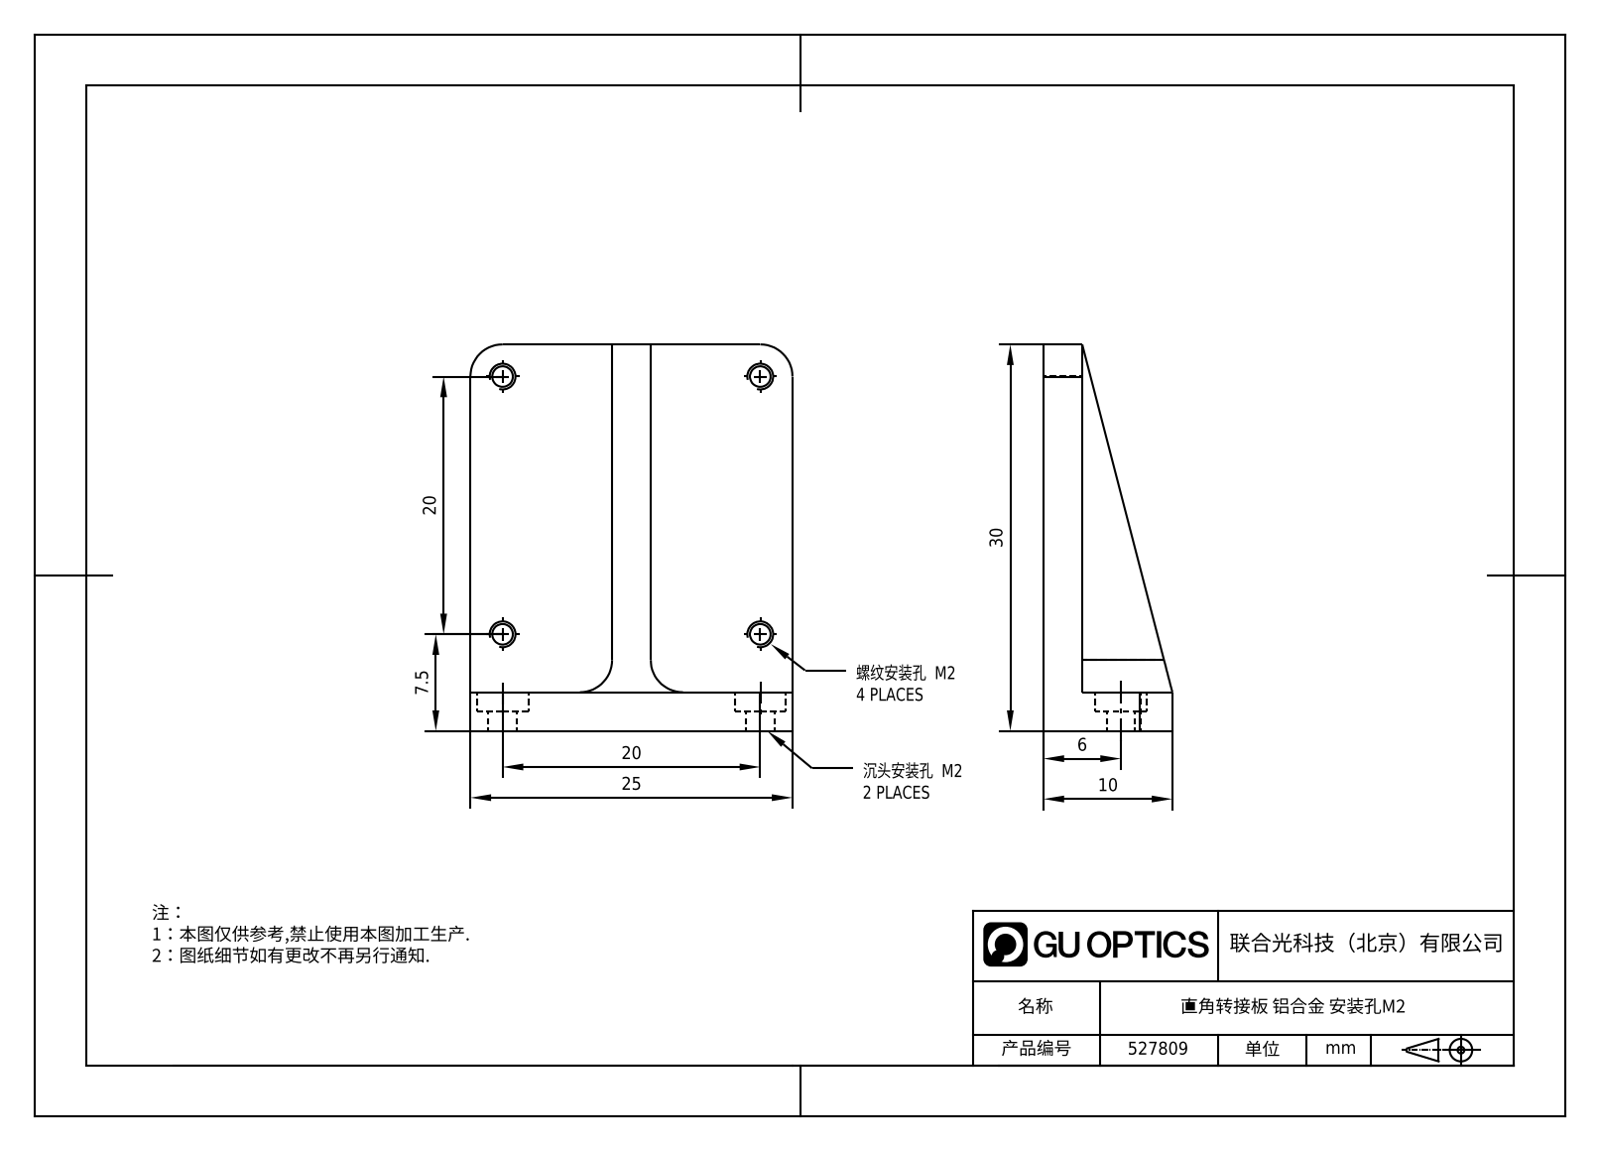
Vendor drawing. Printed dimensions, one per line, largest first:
30
25
20
20
10
7.5
6
